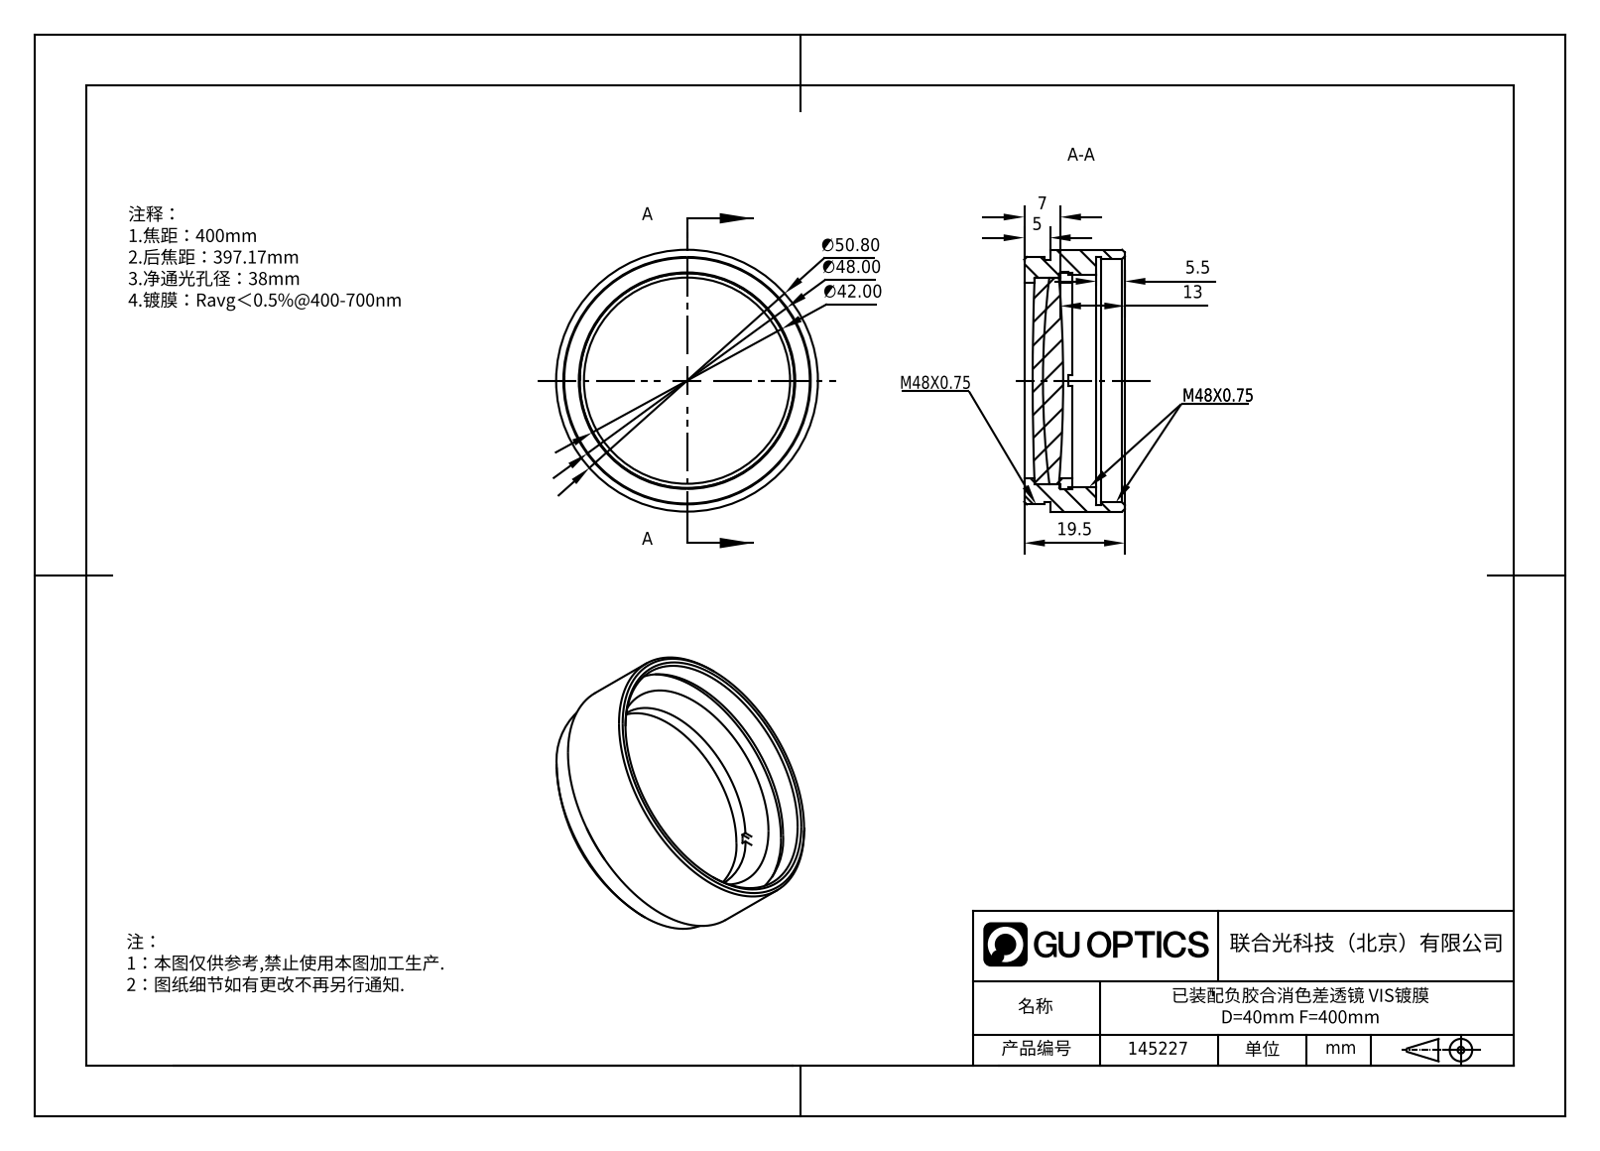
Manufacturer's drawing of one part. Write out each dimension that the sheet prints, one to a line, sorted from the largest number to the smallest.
∅50.80
∅48.00
∅42.00
19.5
13
7
5.5
5
